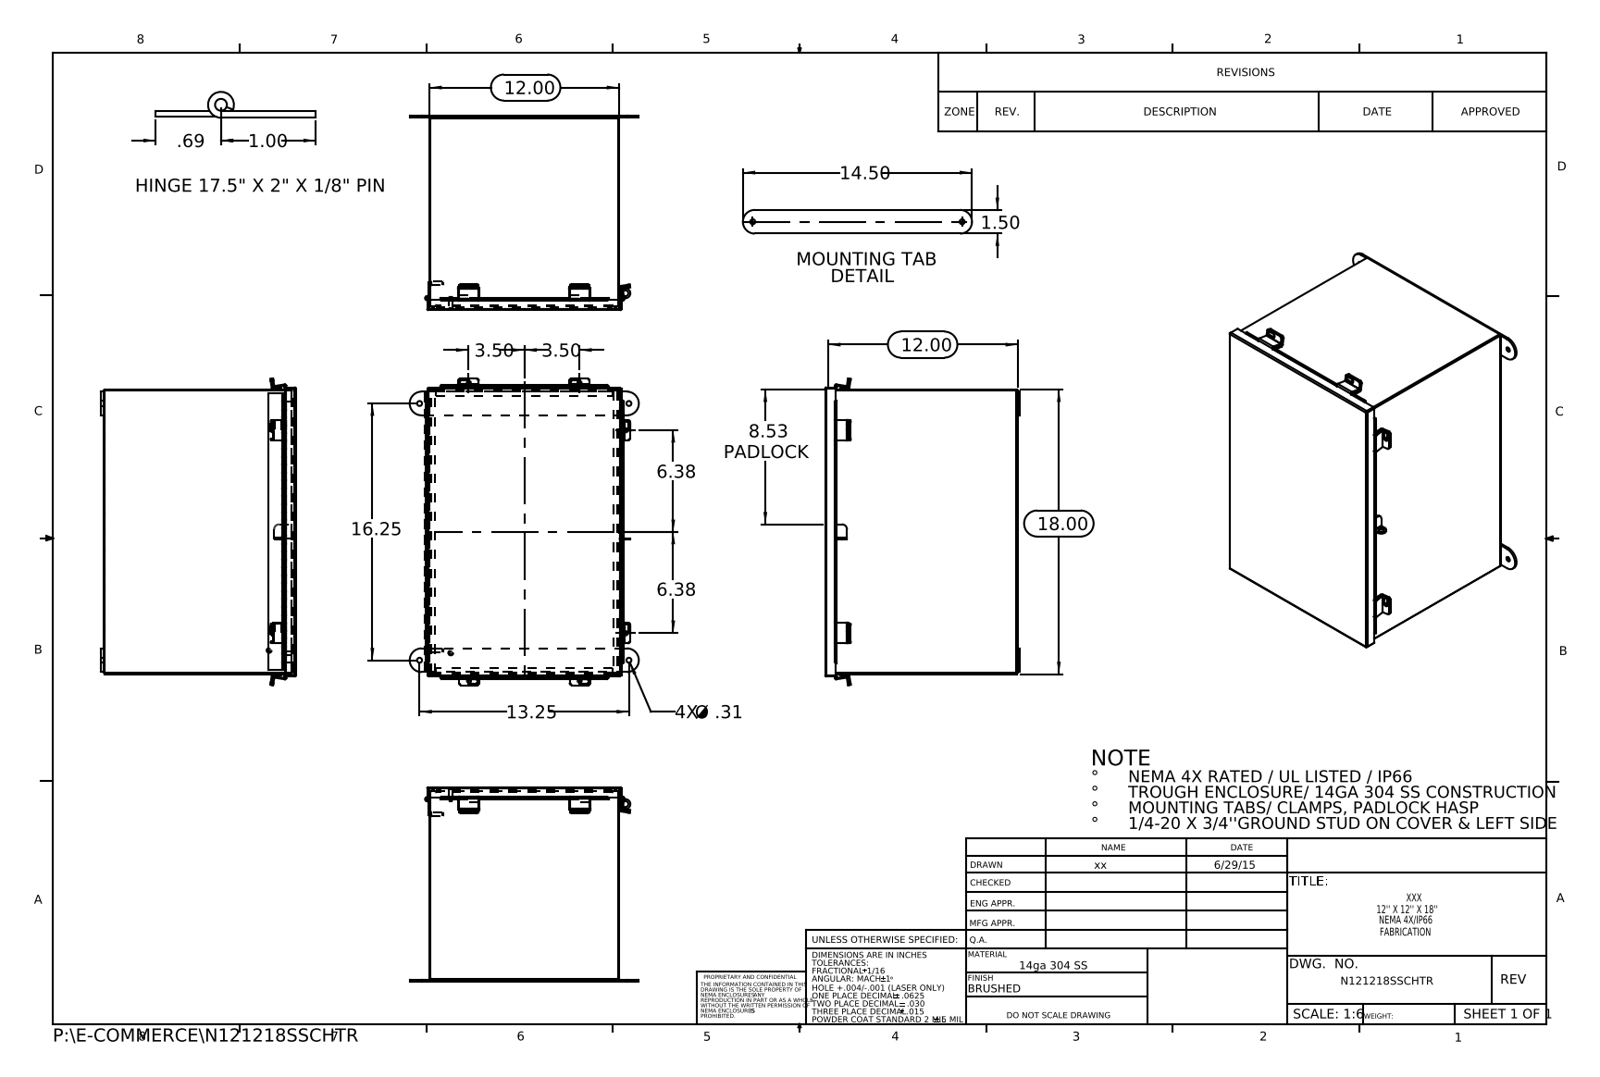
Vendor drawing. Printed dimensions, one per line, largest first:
18.00
16.25
14.50
13.25
12.00
12.00
8.53 PADLOCK
6.38
6.38
3.50
3.50
1.50
1.00
.69
4X Ø .31
